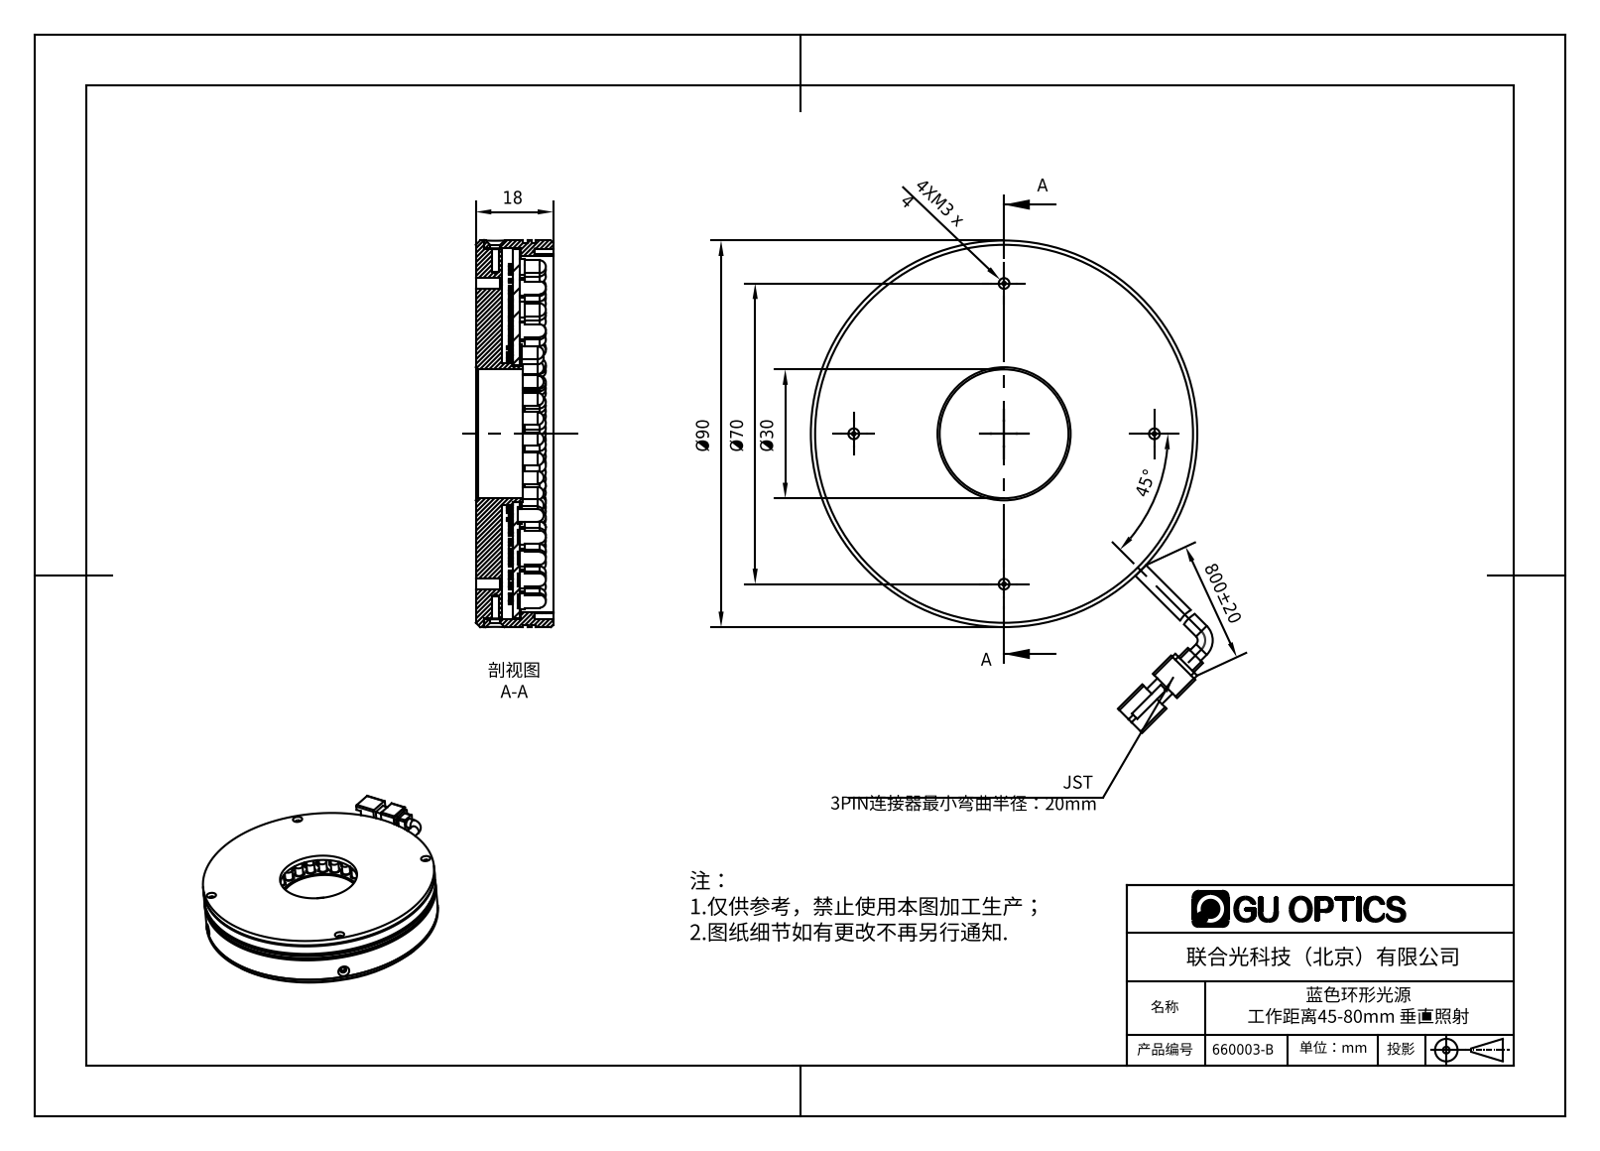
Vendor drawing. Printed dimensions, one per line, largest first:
800±20
Ø90
Ø70
45°
Ø30
18
4XM3 x 4
